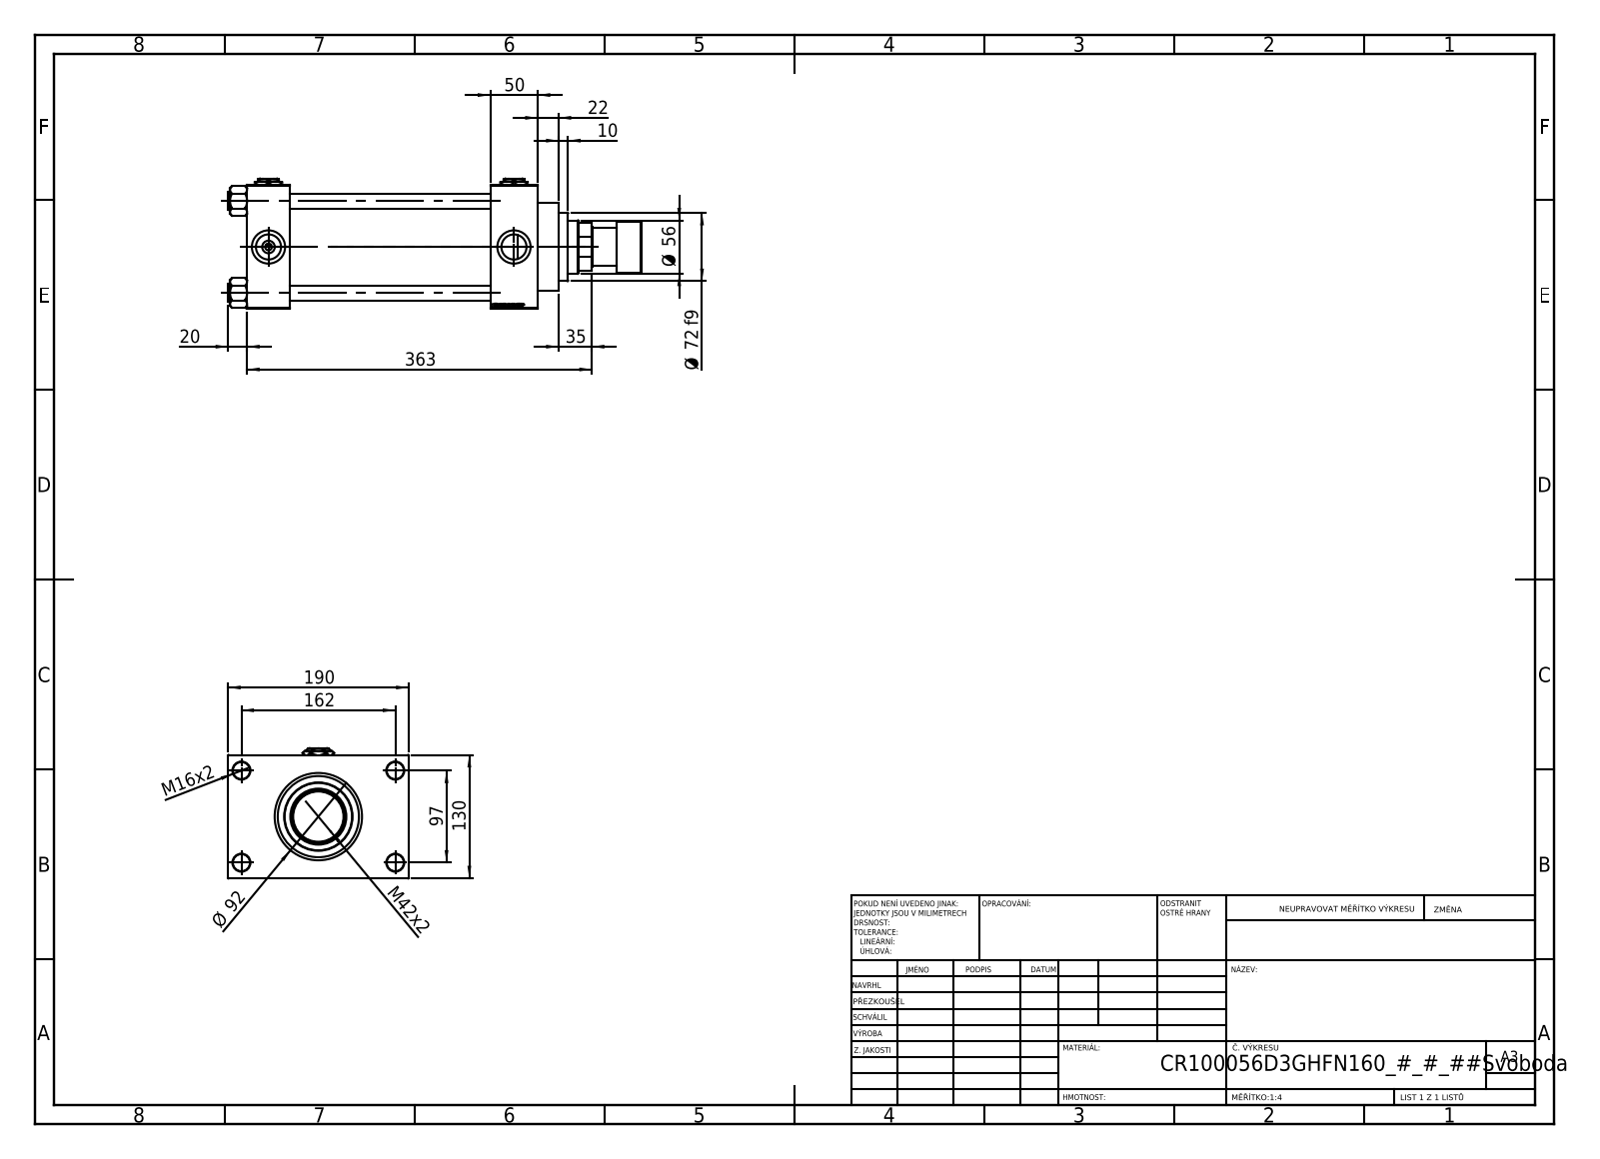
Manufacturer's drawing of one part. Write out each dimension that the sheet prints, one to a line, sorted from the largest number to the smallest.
363
190
162
130
97
Ø 92
Ø 72 f9
Ø 56
50
M42x2
35
22
20
M16x2
10
